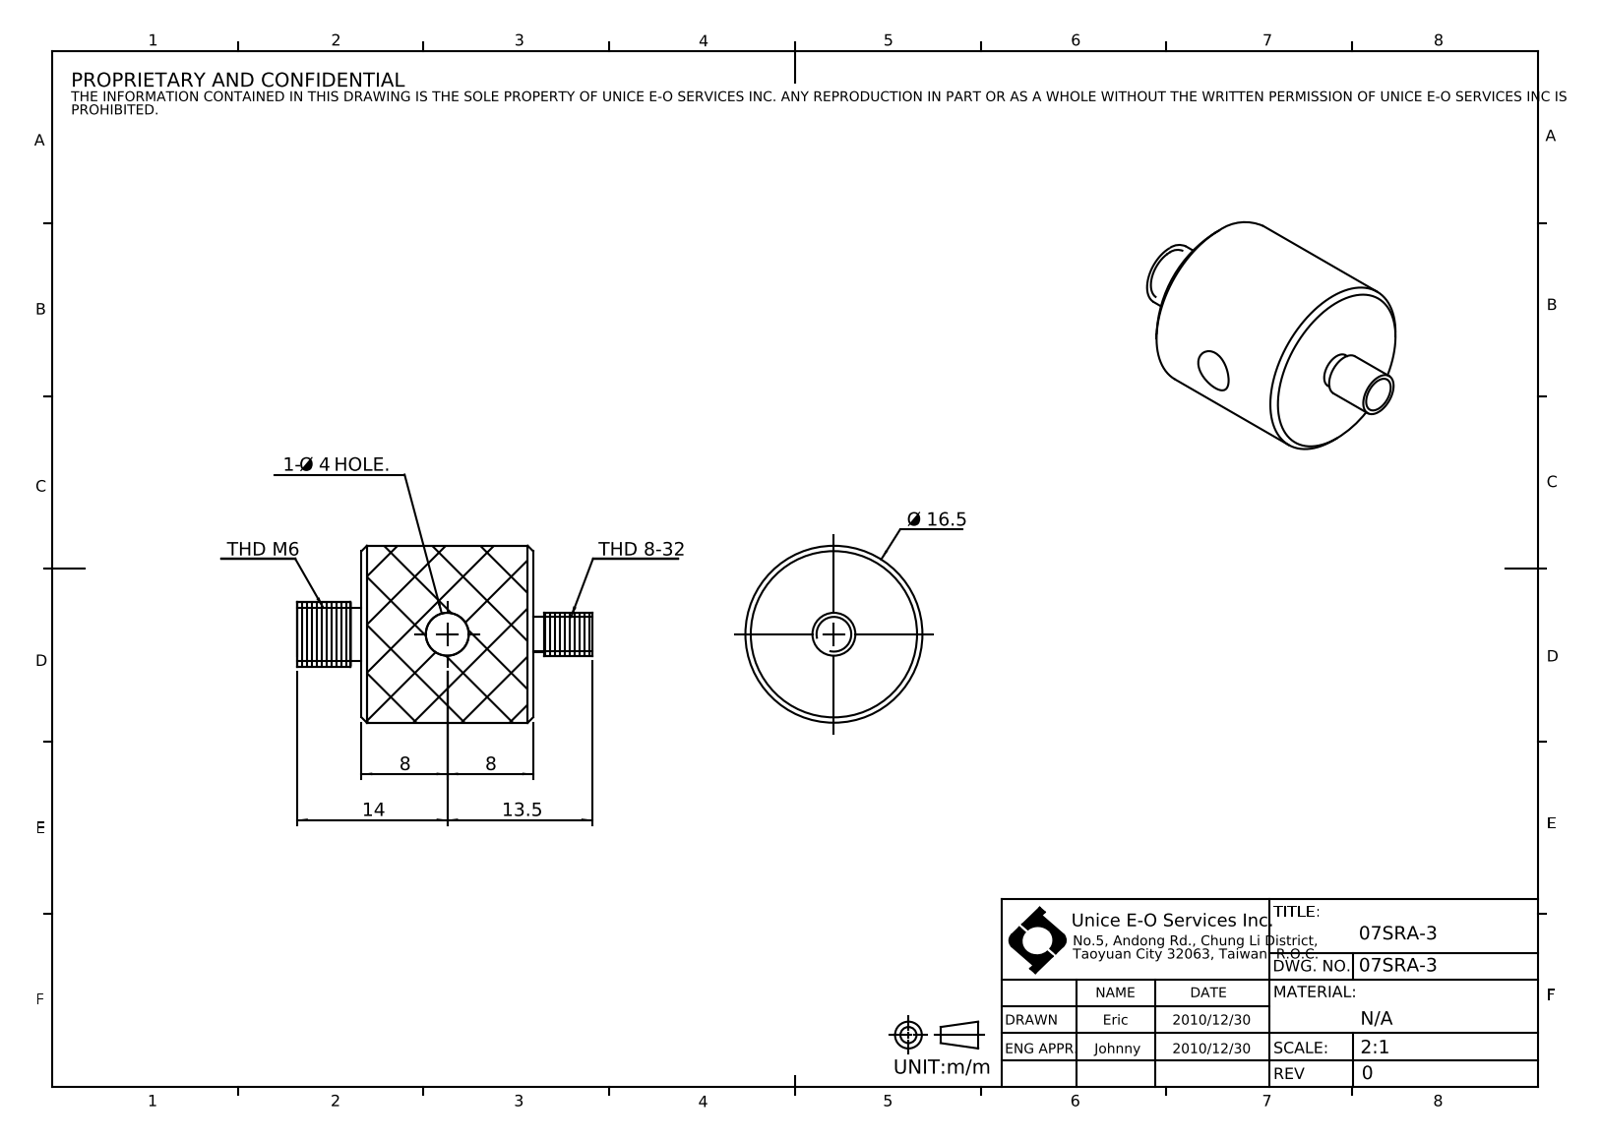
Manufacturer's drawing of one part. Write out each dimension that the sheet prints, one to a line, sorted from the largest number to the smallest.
Ø 16.5
14
13.5
8
8
1- Ø 4 HOLE.
